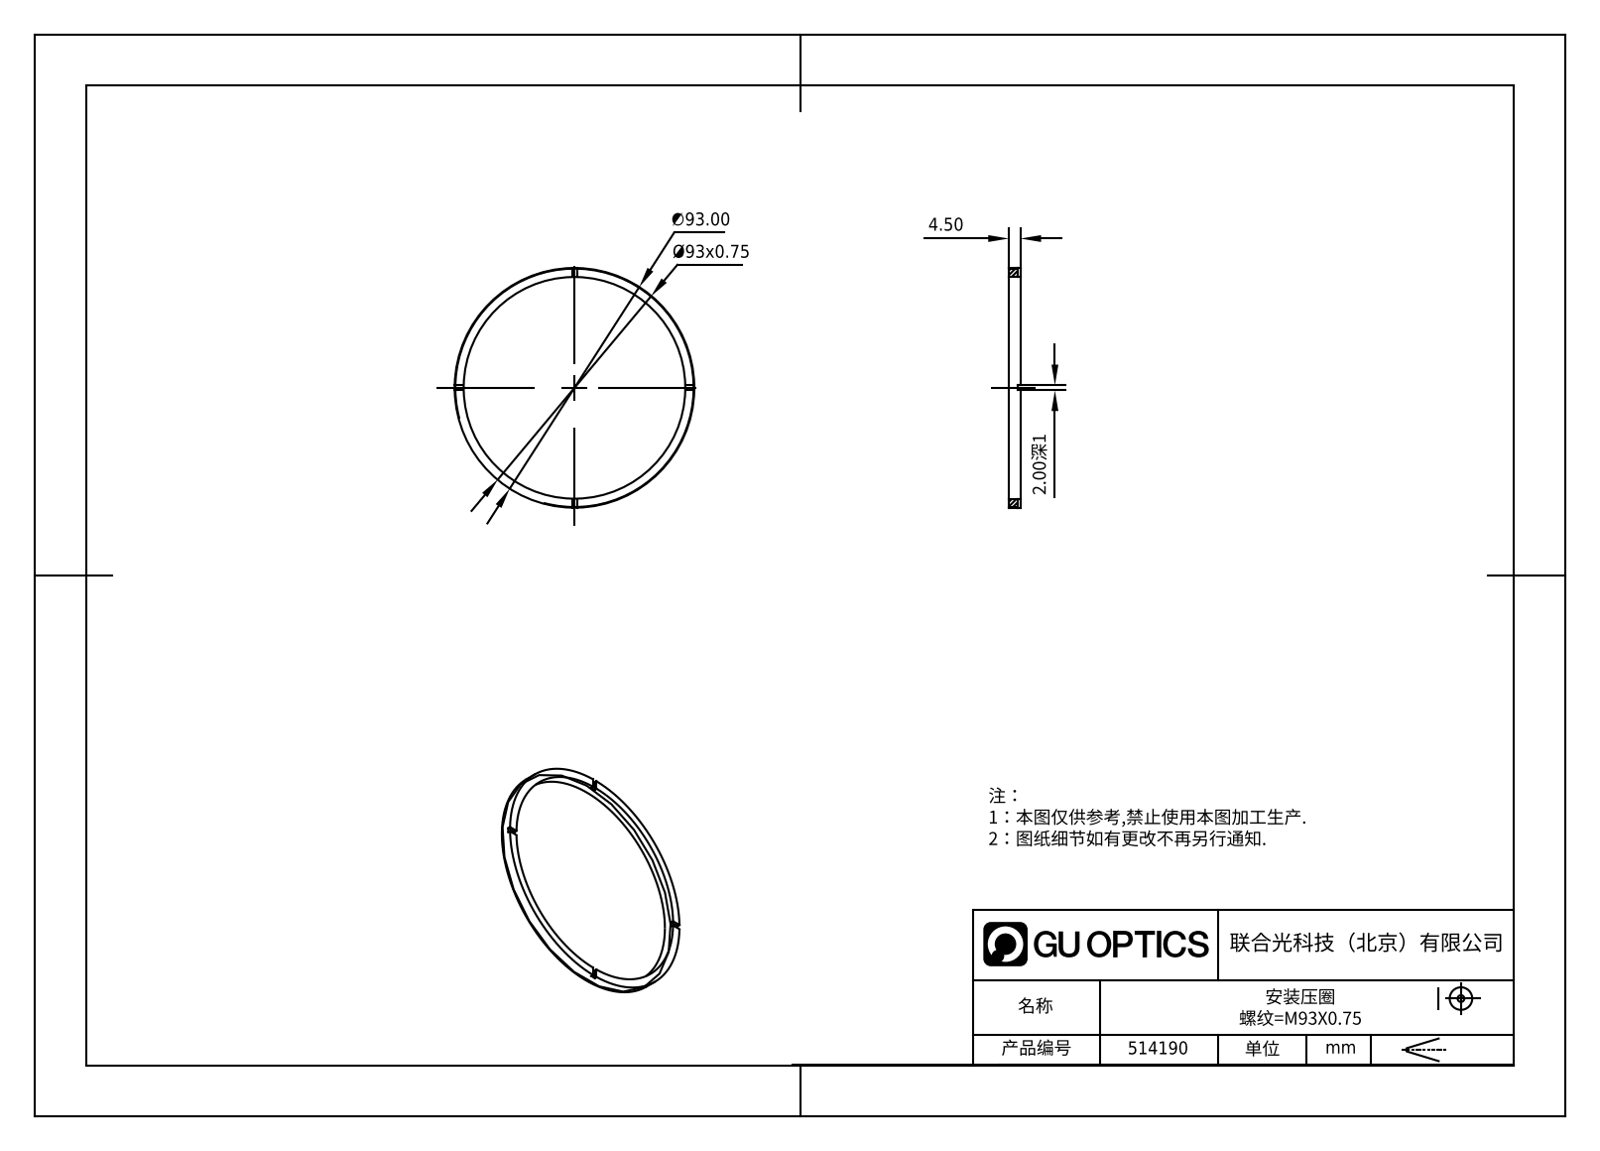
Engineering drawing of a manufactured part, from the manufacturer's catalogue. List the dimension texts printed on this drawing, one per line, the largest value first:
∅93.00
Ø93x0.75
4.50
2.00深1
